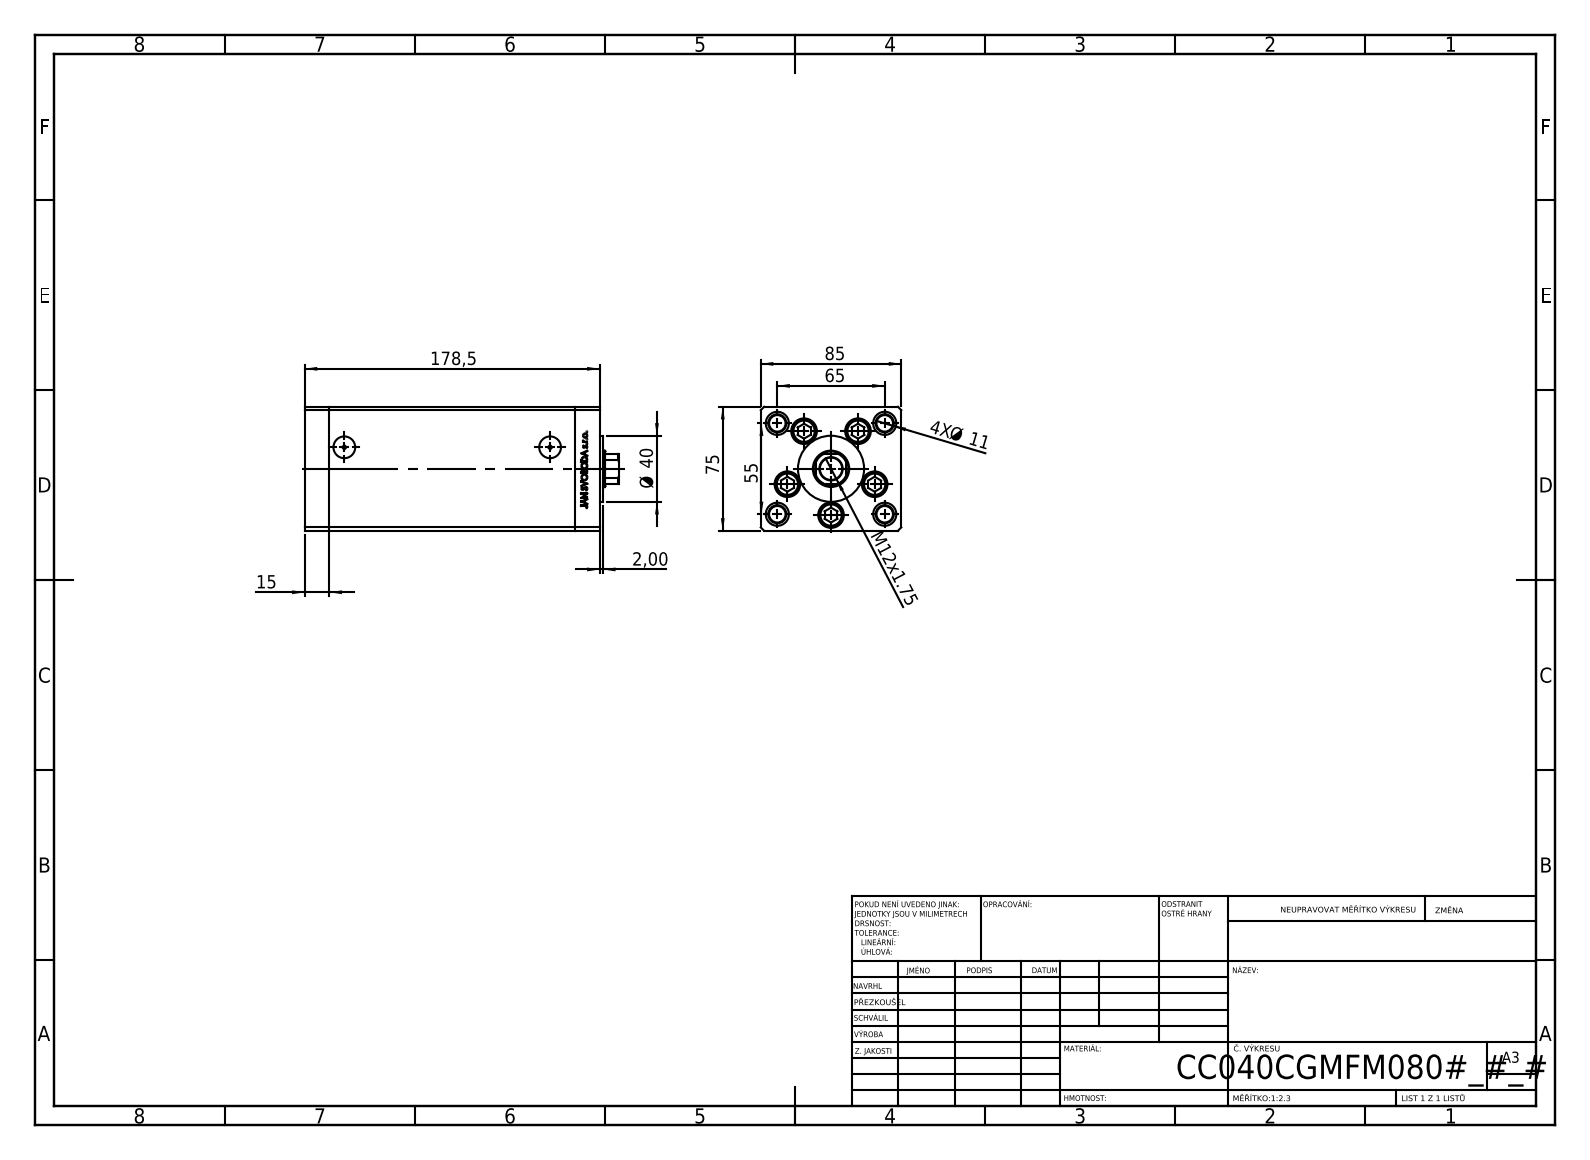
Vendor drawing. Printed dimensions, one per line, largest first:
178,5
85
75
65
55
Ø 40
15
M12x1.75
4X Ø 11
2,00
